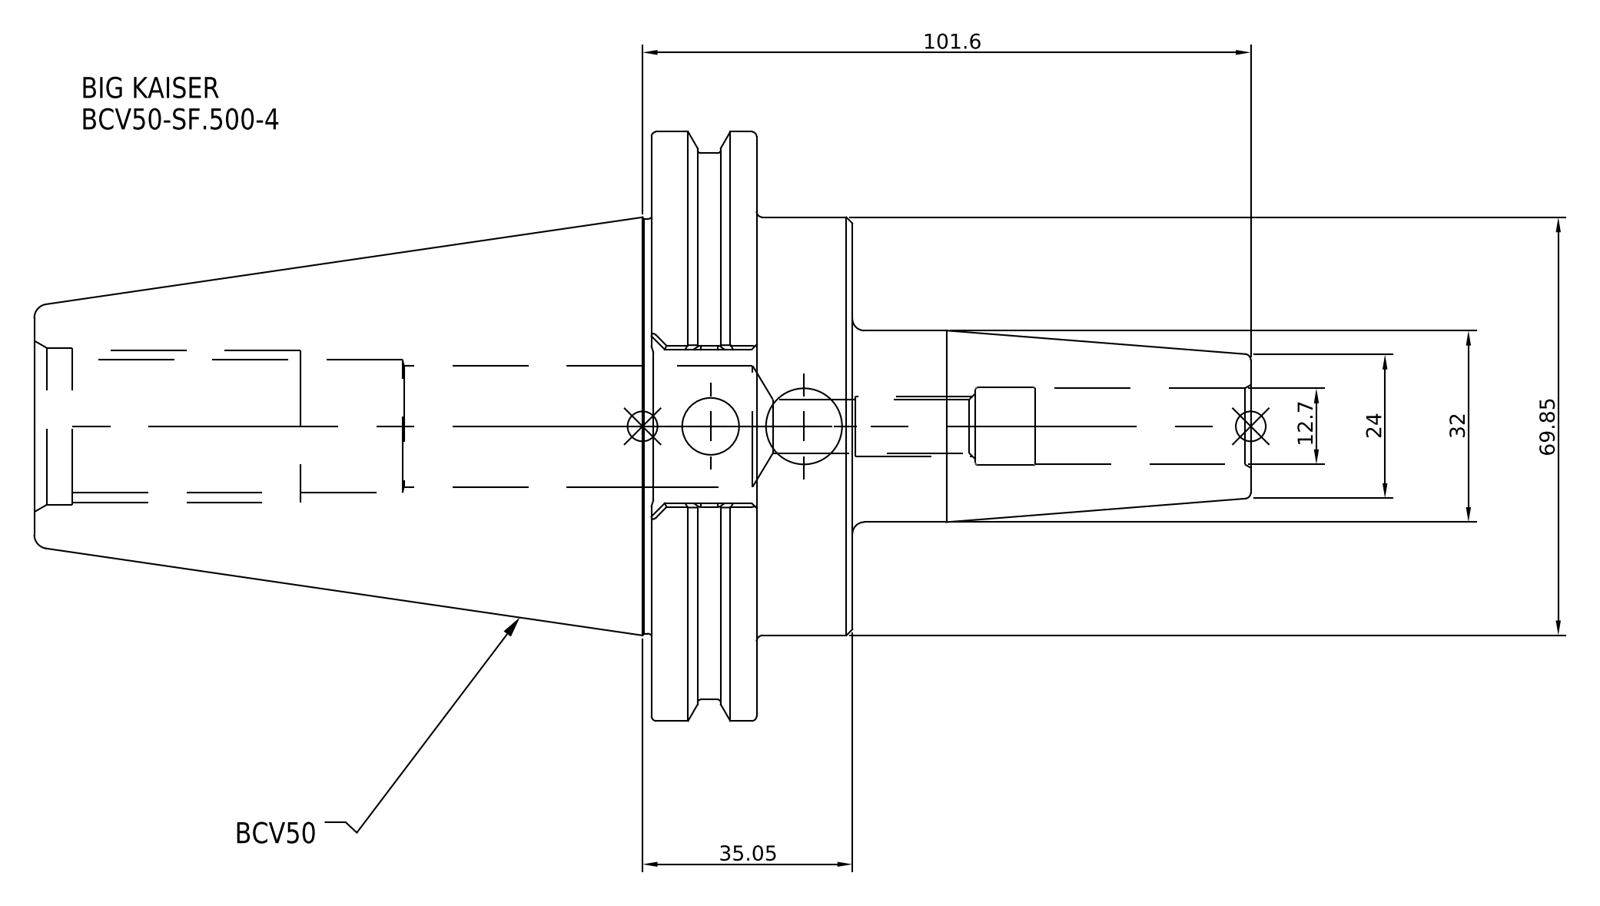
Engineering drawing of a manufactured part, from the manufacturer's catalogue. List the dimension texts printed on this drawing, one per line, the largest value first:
101.6
69.85
35.05
32
24
12.7
